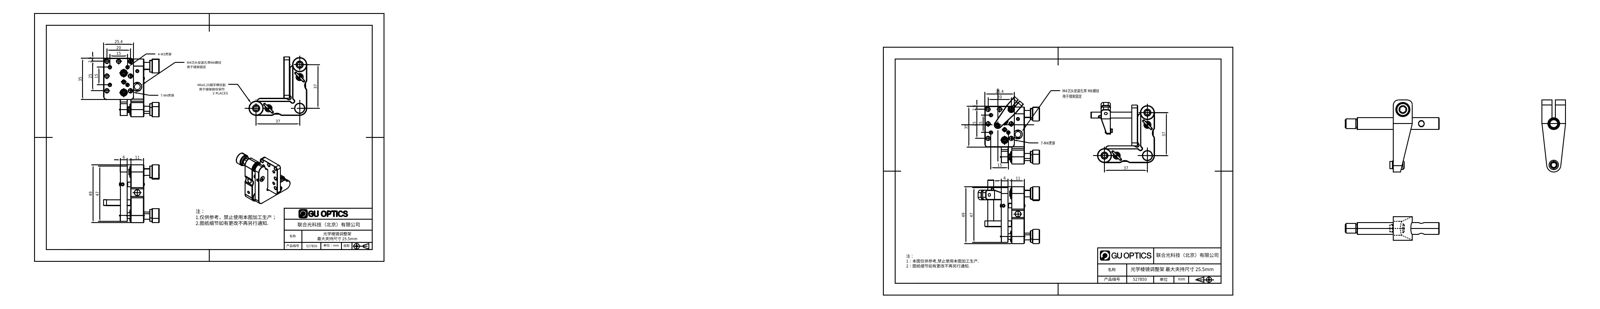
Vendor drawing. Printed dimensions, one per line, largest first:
49
49
47
47
37
37
37
37
35
35
25,4
25.4
25
25
20
20
15
15
15
15
11
11
6
6
2,5
2.5
